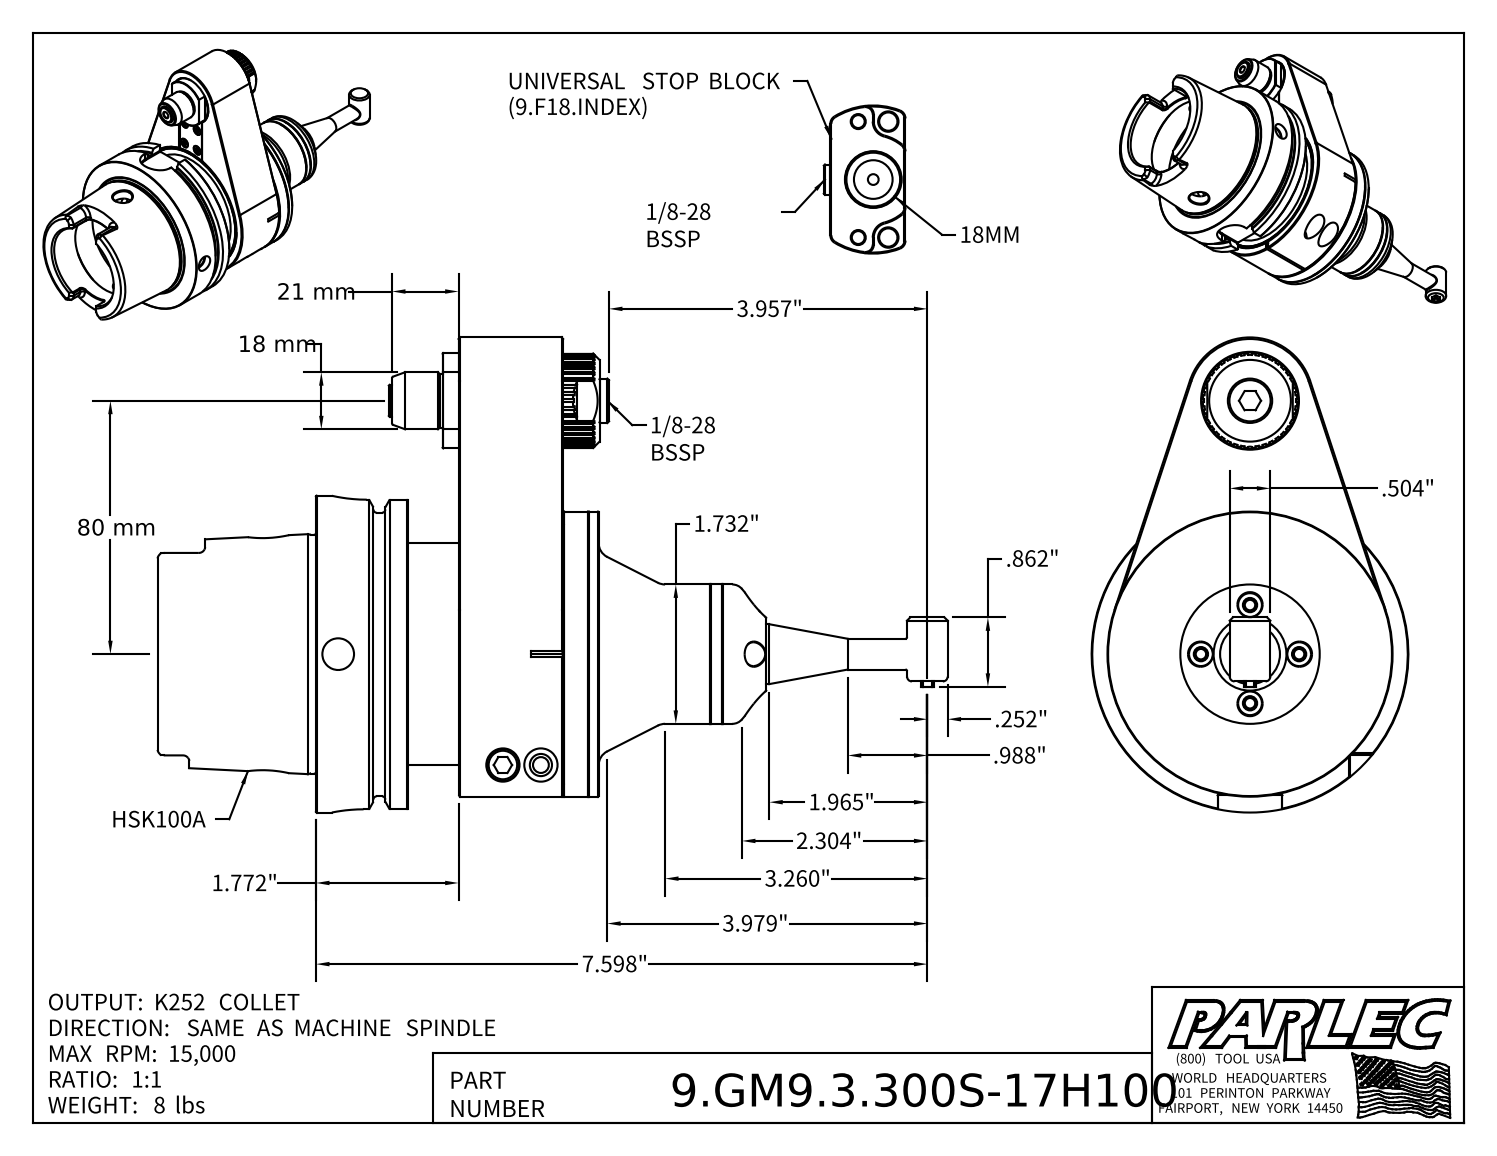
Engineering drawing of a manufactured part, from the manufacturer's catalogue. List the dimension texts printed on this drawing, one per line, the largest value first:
80 mm
21 mm
18 mm
7.598"
3.979"
3.957"
3.260"
2.304"
1.965"
1.772"
1.732"
.988"
.862"
.504"
.252"
